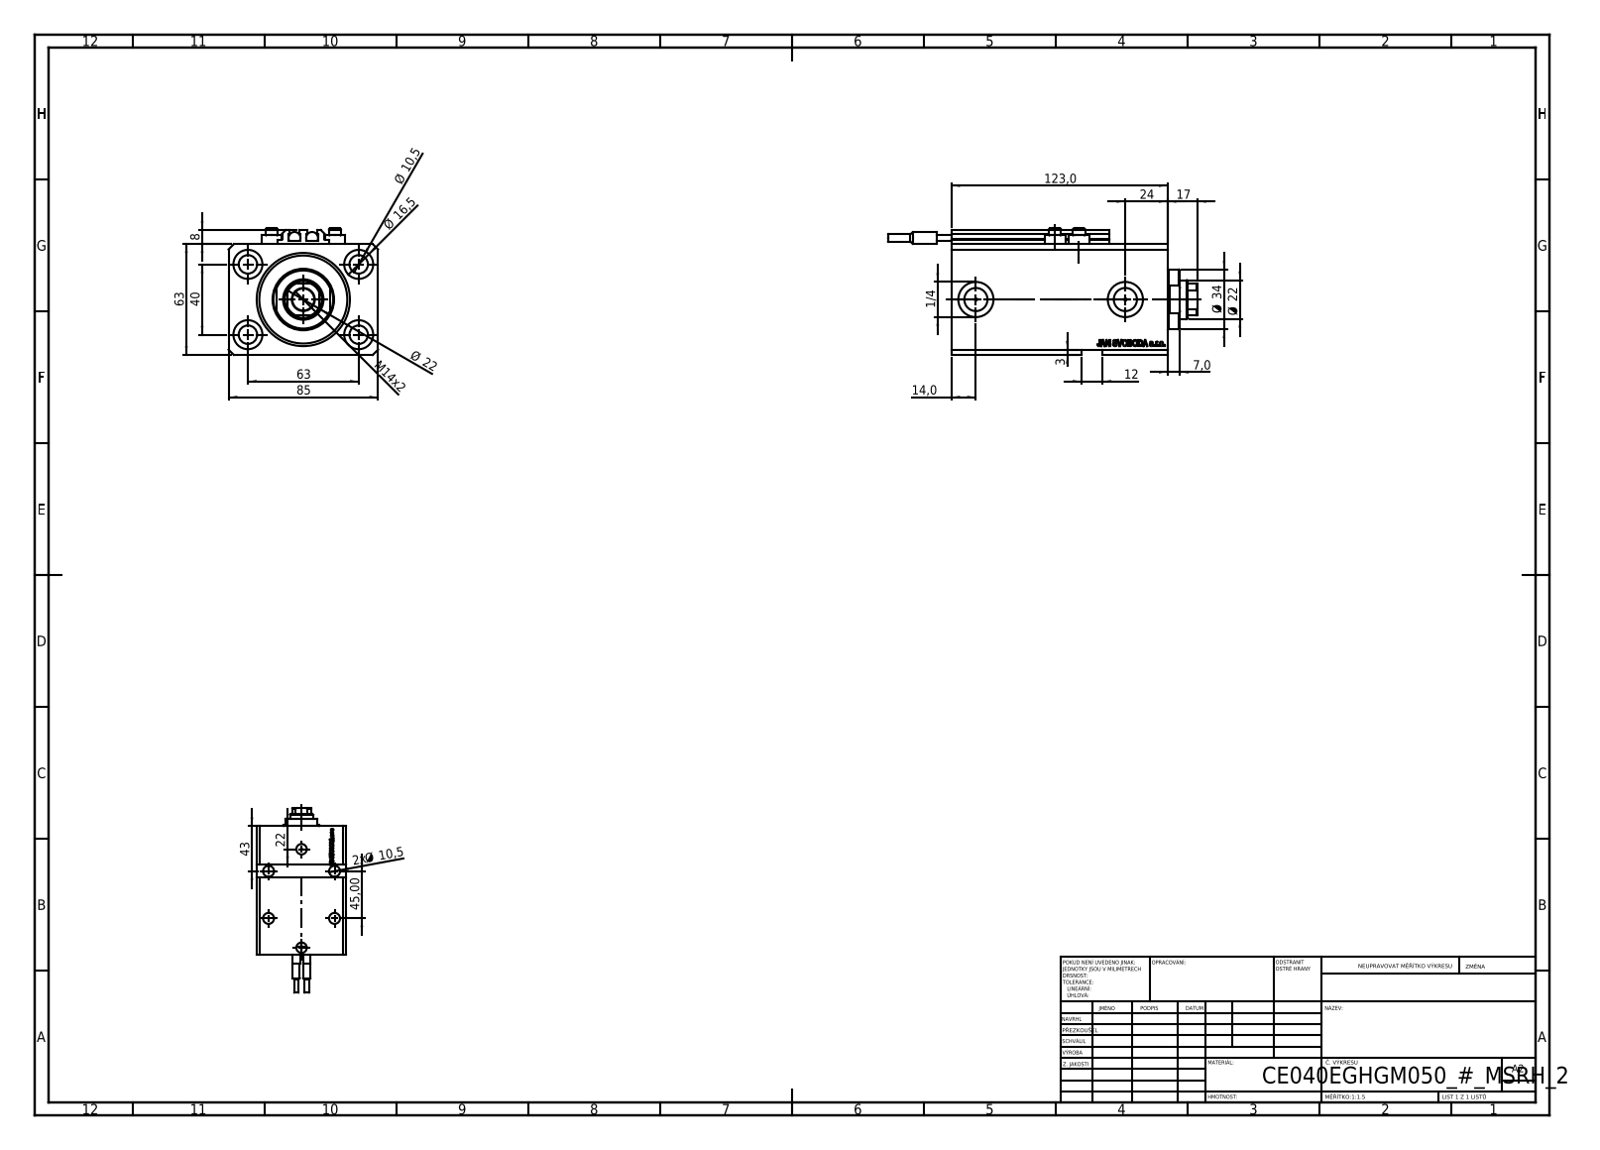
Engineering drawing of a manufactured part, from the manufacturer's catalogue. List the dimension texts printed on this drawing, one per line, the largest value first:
123,0
85
63
63
45,00
43
40
Ø 34
24
Ø 22
Ø 22
22
17
Ø 16,5
M14x2
14,0
12
Ø 10,5
2x Ø 10,5
8
7,0
3
1/4
